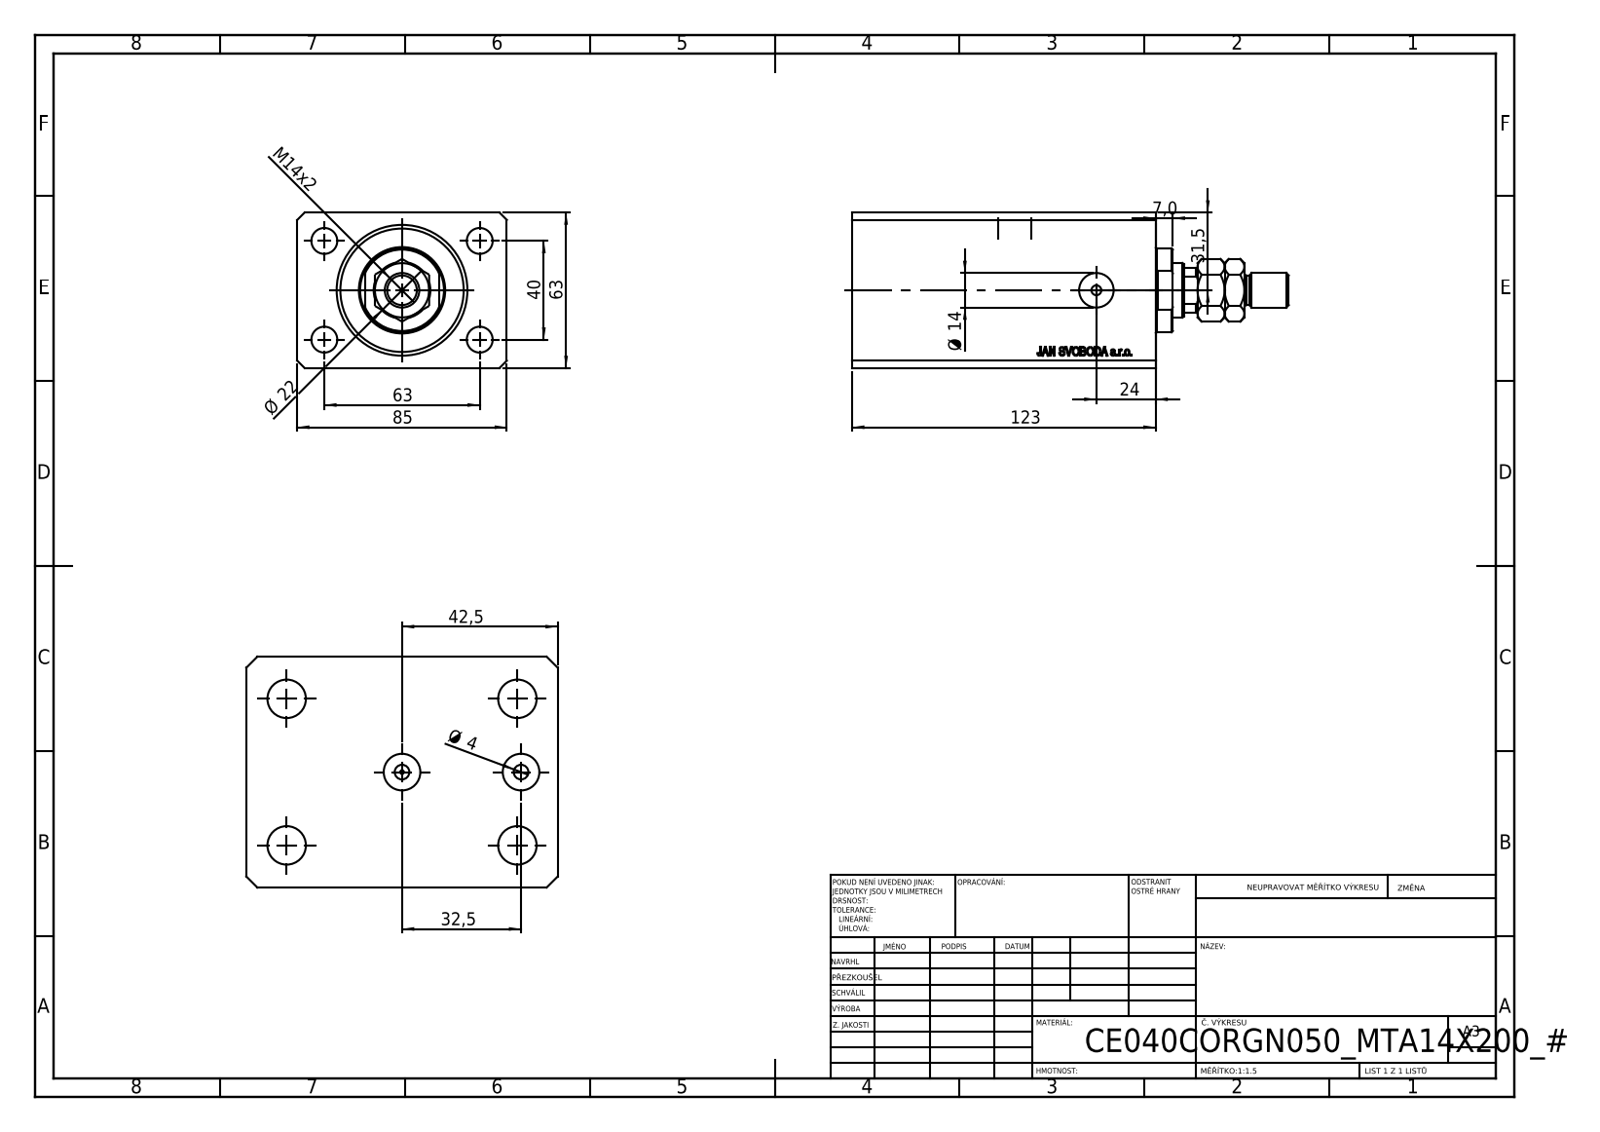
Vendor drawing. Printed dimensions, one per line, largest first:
123
85
63
63
42,5
40
32,5
31,5
24
Ø 22
M14x2
Ø 14
7,0
Ø 4
